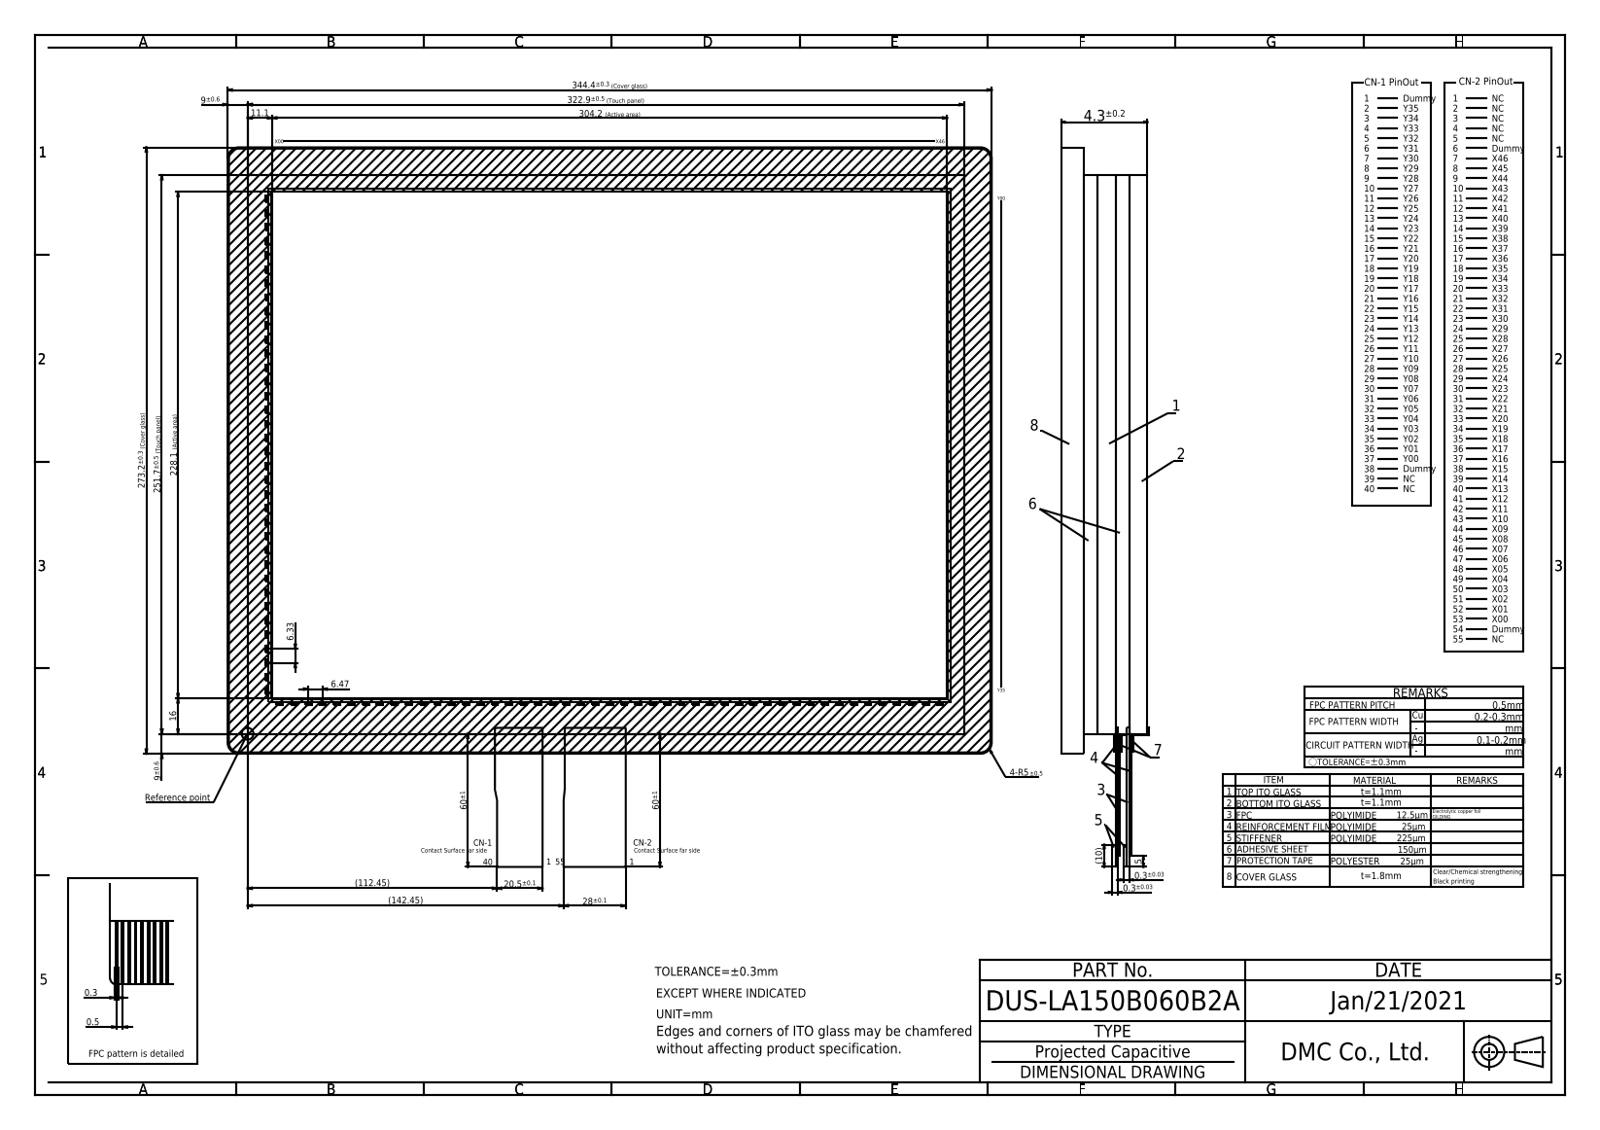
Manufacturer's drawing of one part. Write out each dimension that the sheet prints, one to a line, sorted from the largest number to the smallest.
344.4±0.3 (Cover glass)
322.9±0.5 (Touch panel)
304.2 (Active area)
273.2±0.3 (Cover glass)
251.7±0.5 (Touch panel)
228.1 (Active area)
(142.45)
(112.45)
60±1
60±1
28±0.1
20.5±0.1
16
11.1
(10)
9±0.6
9±0.6
6.47
6.33
5
4.3±0.2
0.5
0.3±0.03
0.3±0.03
0.3
